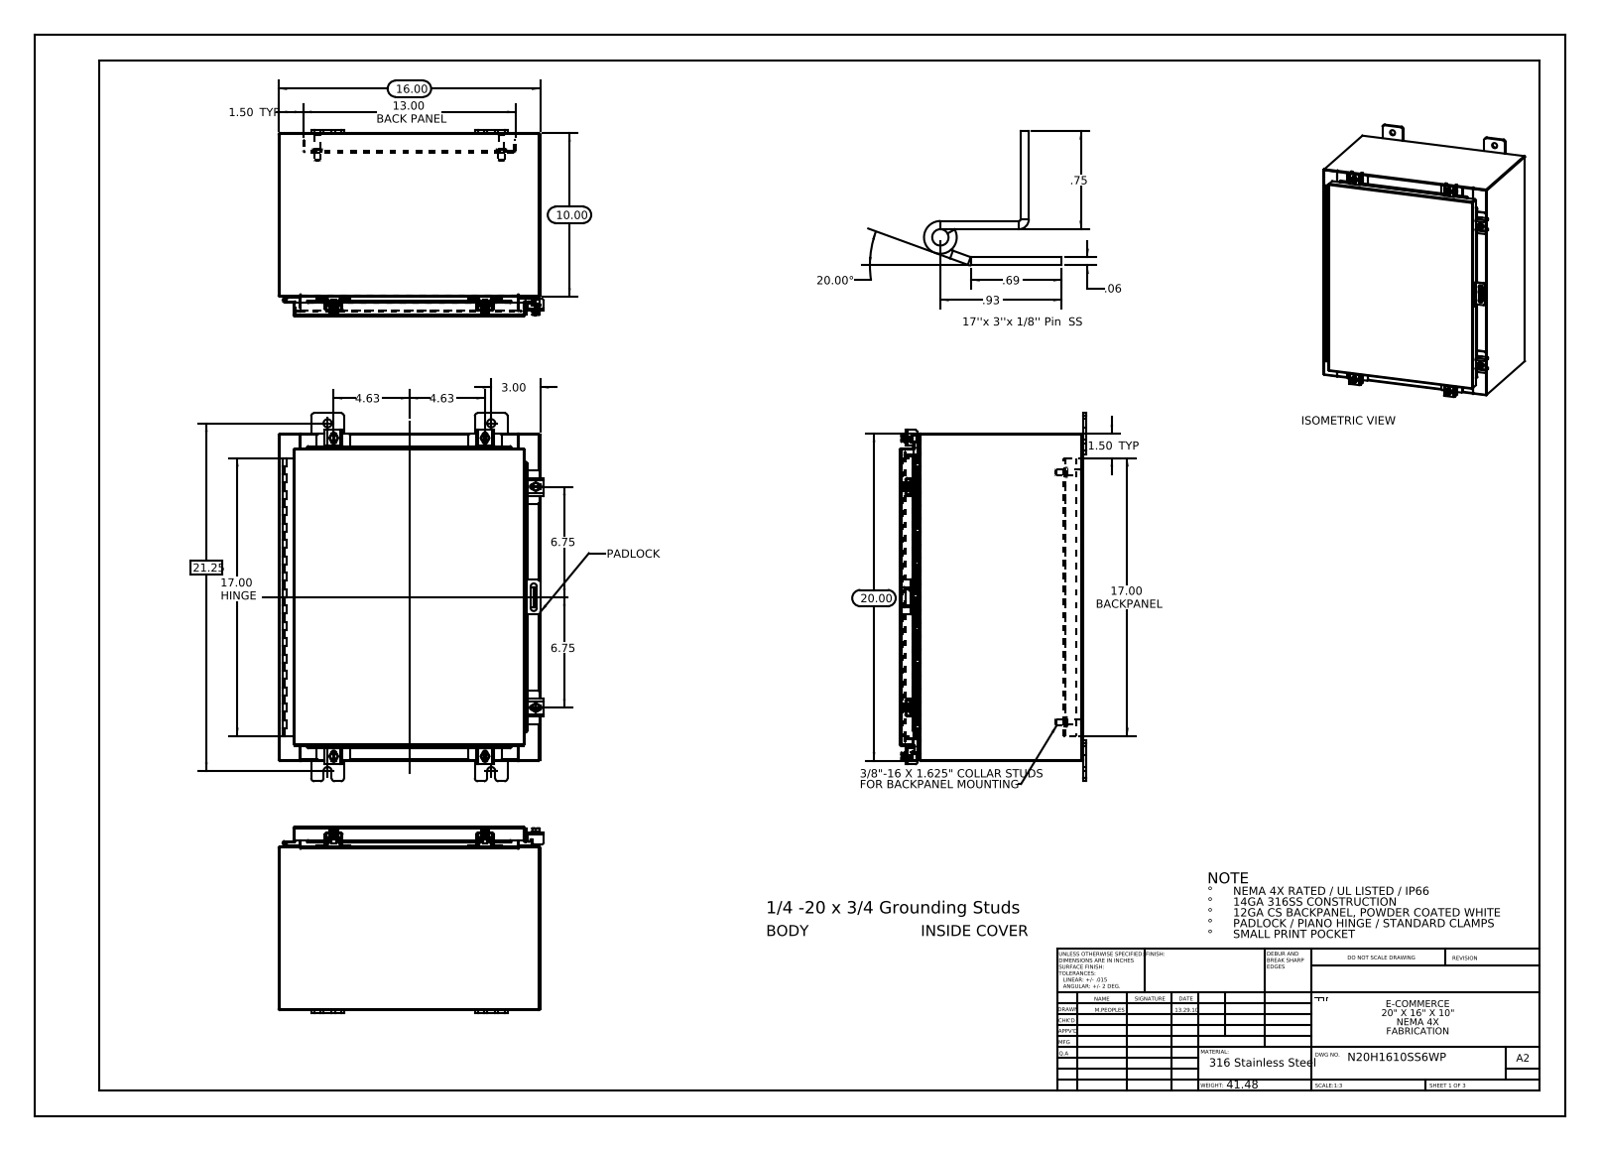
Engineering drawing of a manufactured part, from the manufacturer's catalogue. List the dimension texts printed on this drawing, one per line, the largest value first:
21.25
20.00
20.00°
17.00 HINGE
17.00 BACKPANEL
16.00
13.00 BACK PANEL
10.00
6.75
6.75
4.63
4.63
3.00
1.50 TYP
1.50 TYP
.93
.75
.69
.06
